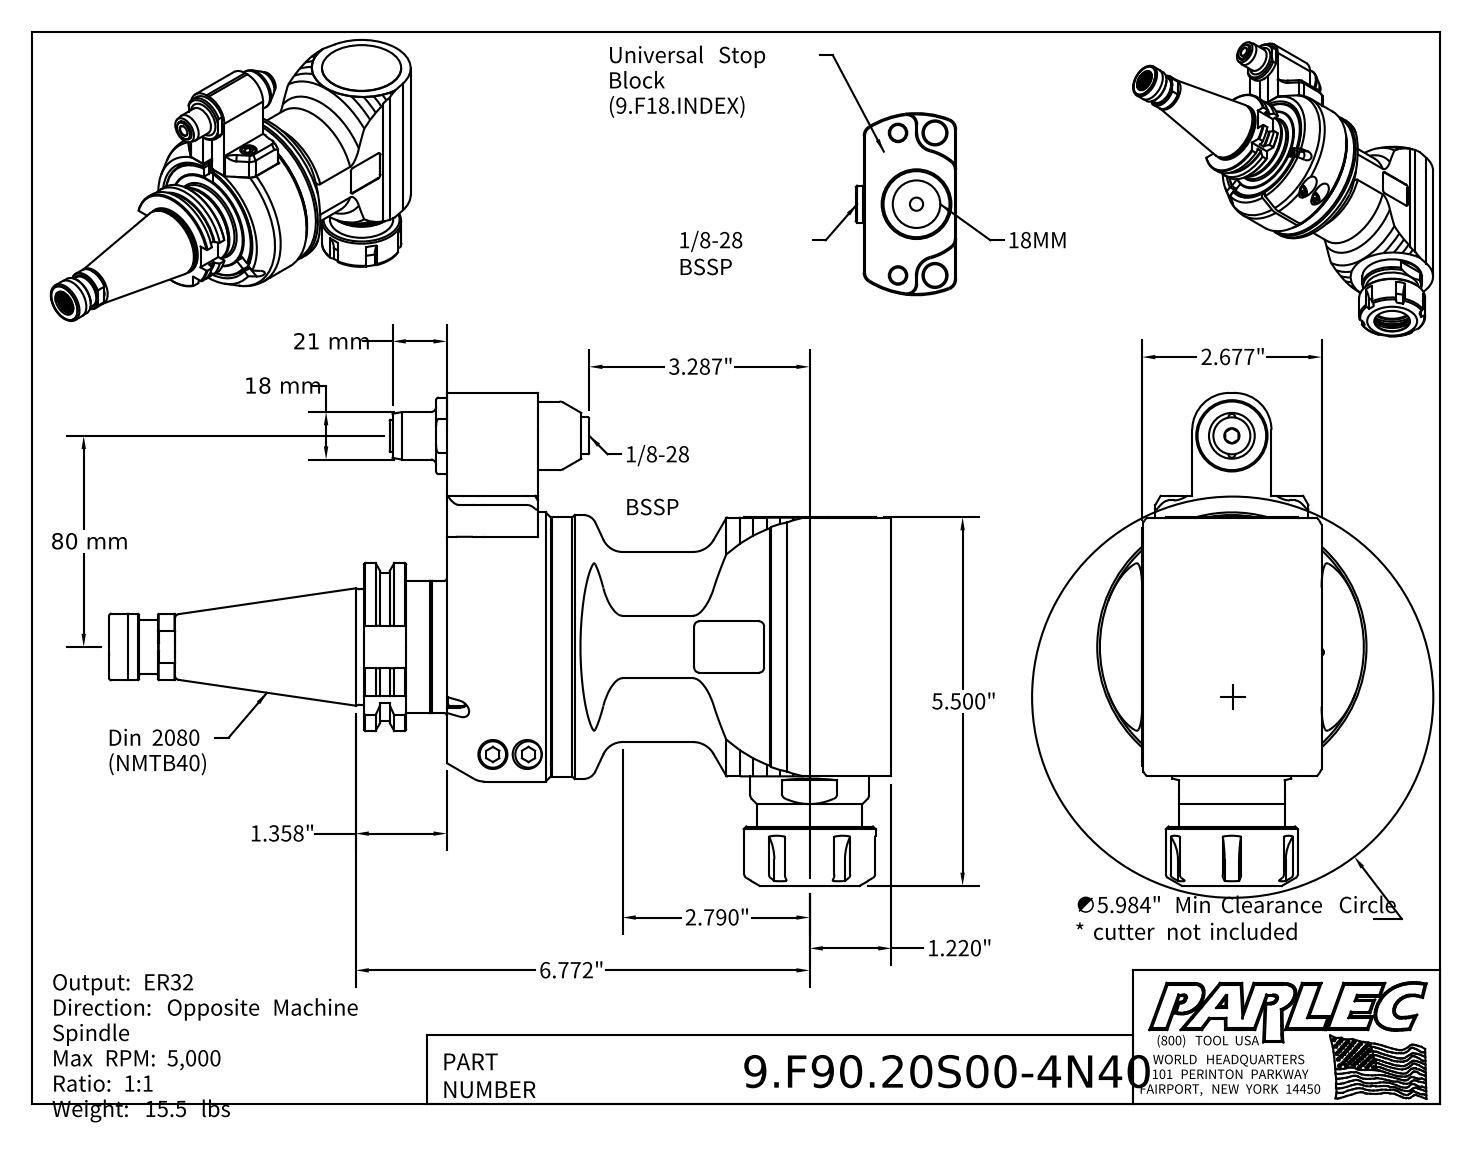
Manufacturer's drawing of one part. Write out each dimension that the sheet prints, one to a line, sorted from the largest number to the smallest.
80 mm
21 mm
18 mm
6.772"
∅5.984" Min Clearance Circle * cutter not included
5.500"
3.287"
2.790"
2.677"
1.358"
1.220"
